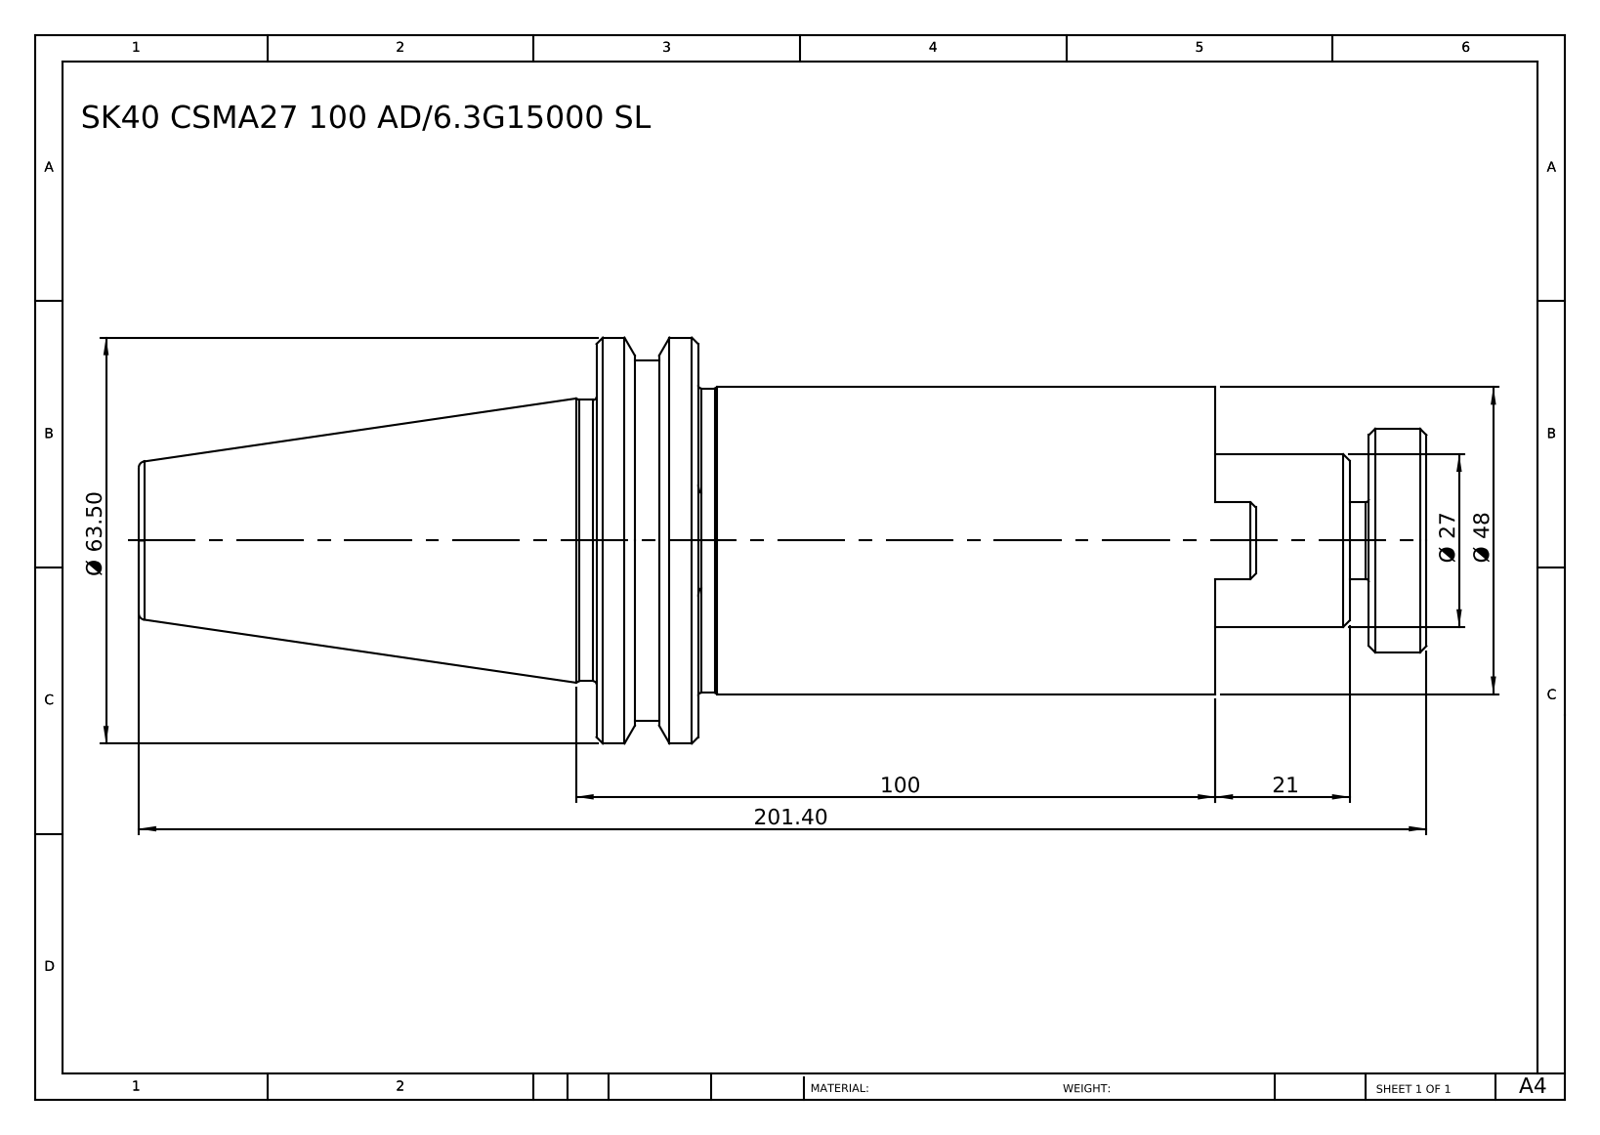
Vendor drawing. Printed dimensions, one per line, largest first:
201.40
100
Ø 63.50
Ø 48
Ø 27
21
